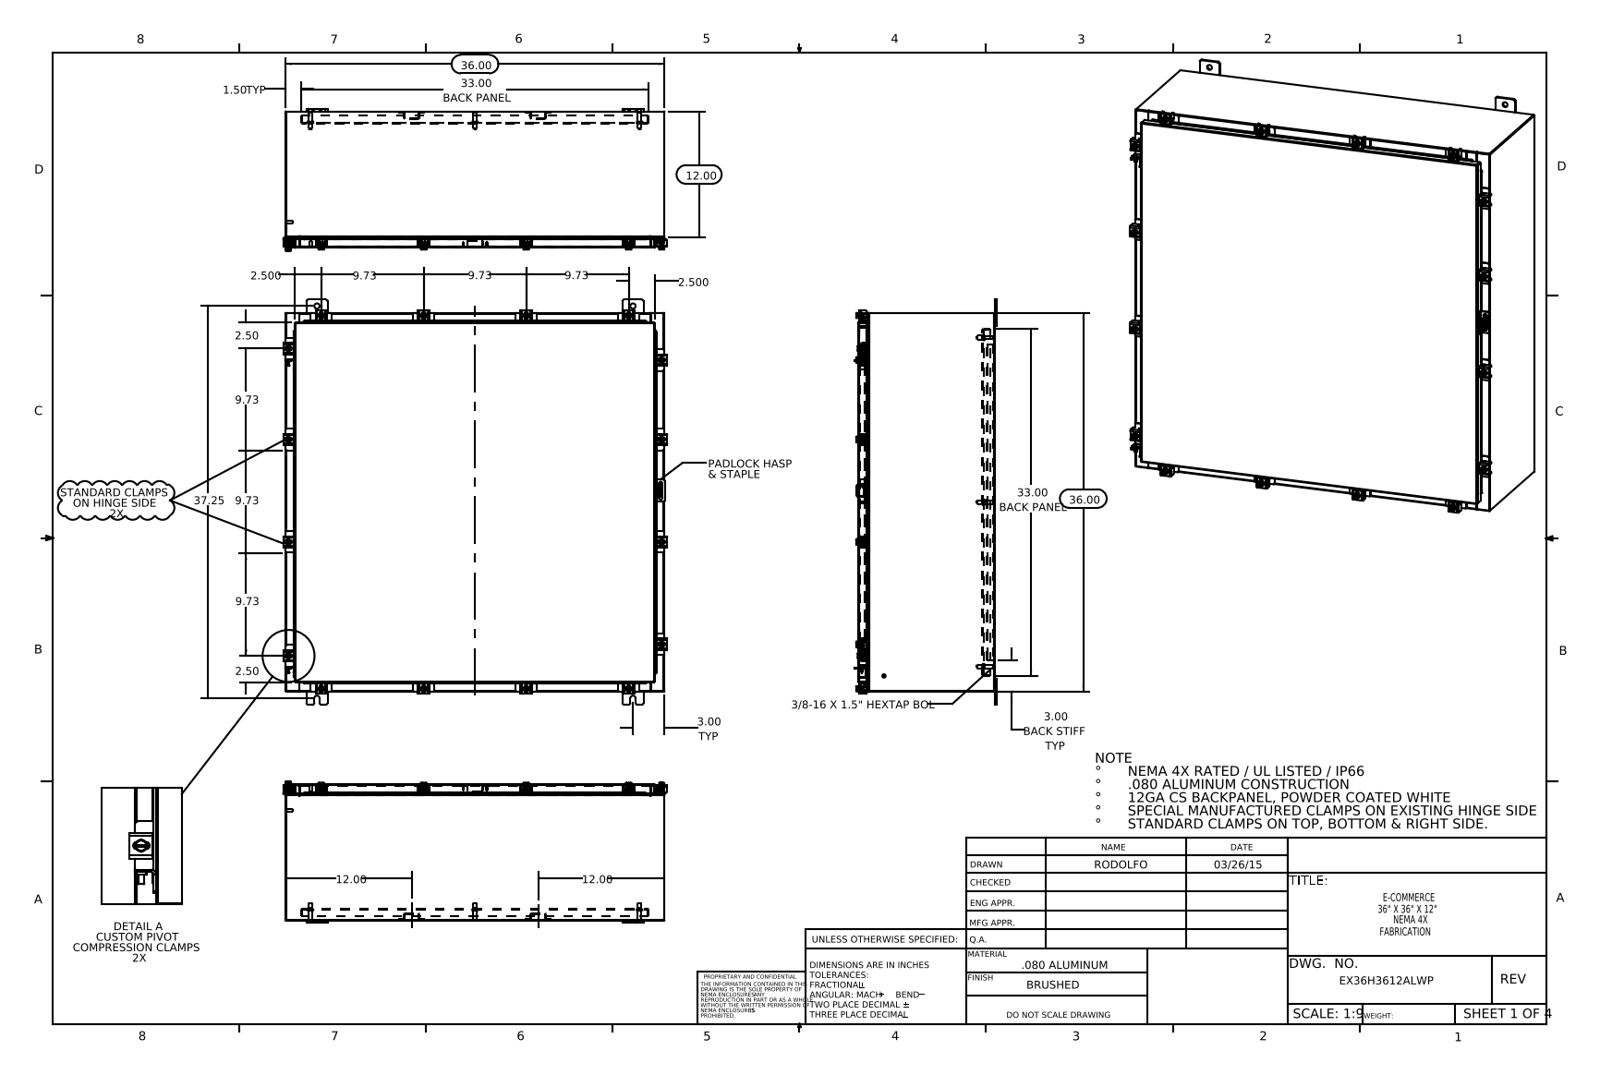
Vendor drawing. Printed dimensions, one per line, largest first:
37.25
36.00
36.00
33.00 BACK PANEL
33.00 BACK PANEL
12.00
12.00
12.00
9.73
9.73
9.73
9.73
9.73
9.73
3.00 TYP
3.00 BACK STIFF TYP
2.500
2.500
2.50
2.50
1.50 TYP
